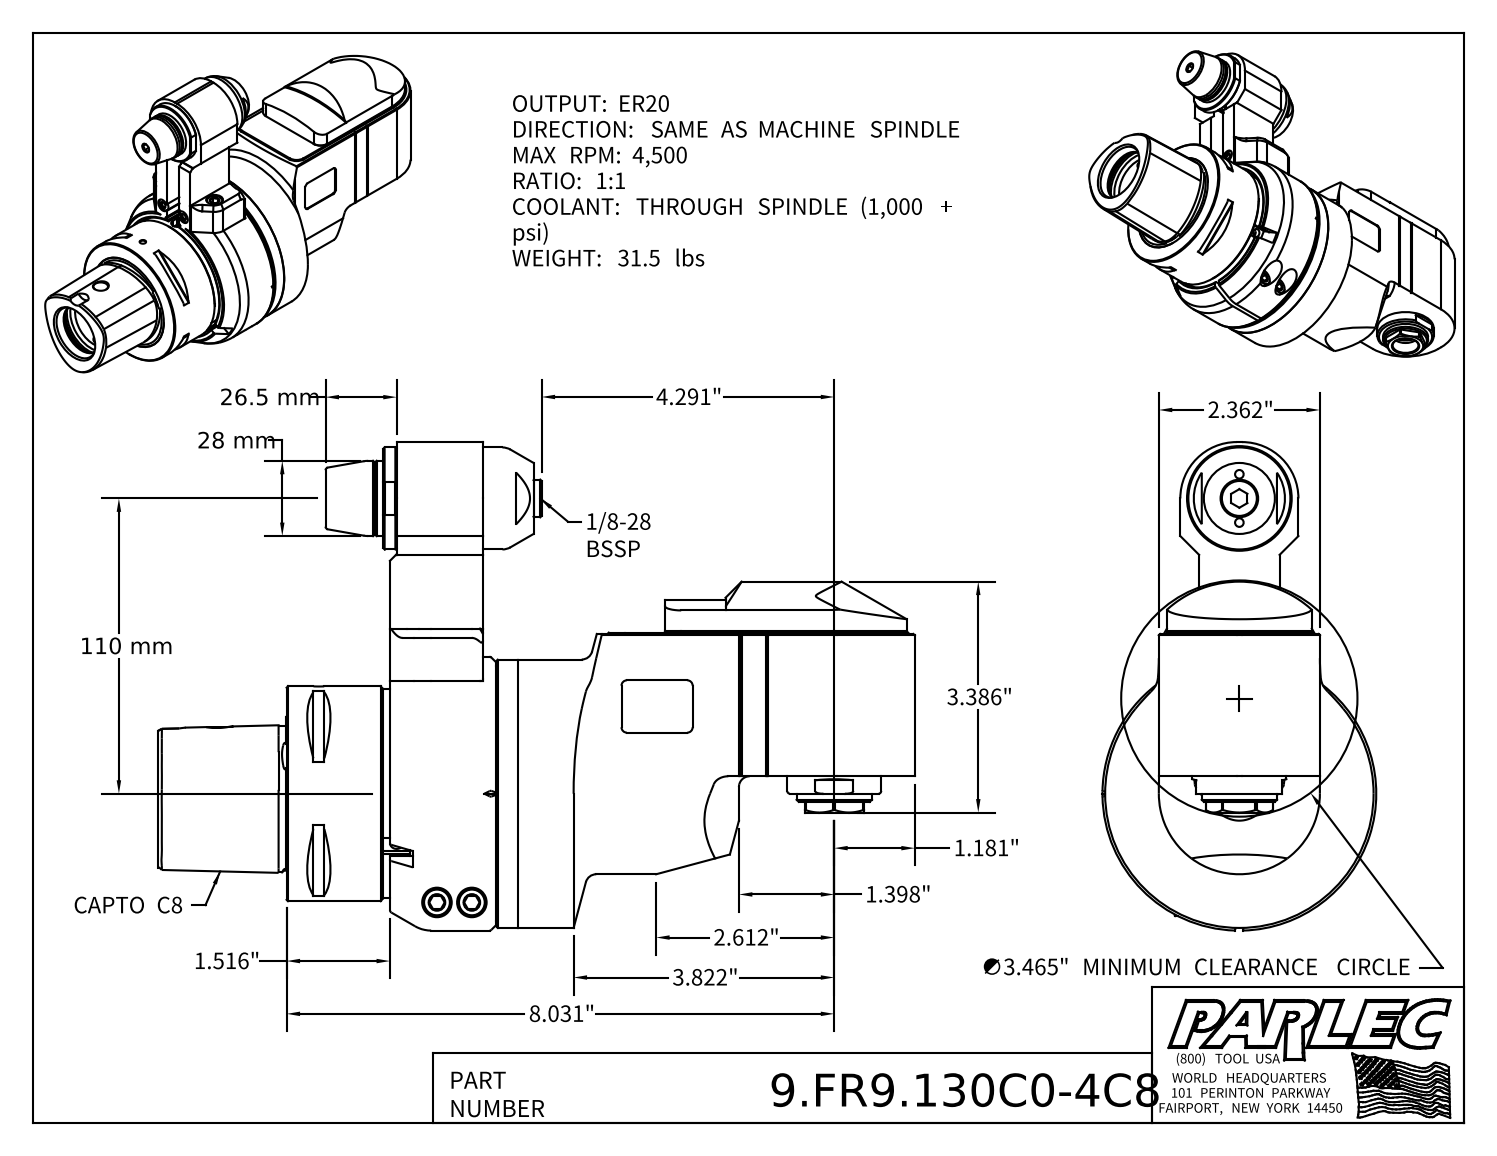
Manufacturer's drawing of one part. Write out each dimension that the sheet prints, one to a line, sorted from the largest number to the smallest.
110 mm
28 mm
26.5 mm
8.031"
4.291"
3.822"
∅3.465" MINIMUM CLEARANCE CIRCLE
3.386"
2.612"
2.362"
1.516"
1.398"
1.181"
